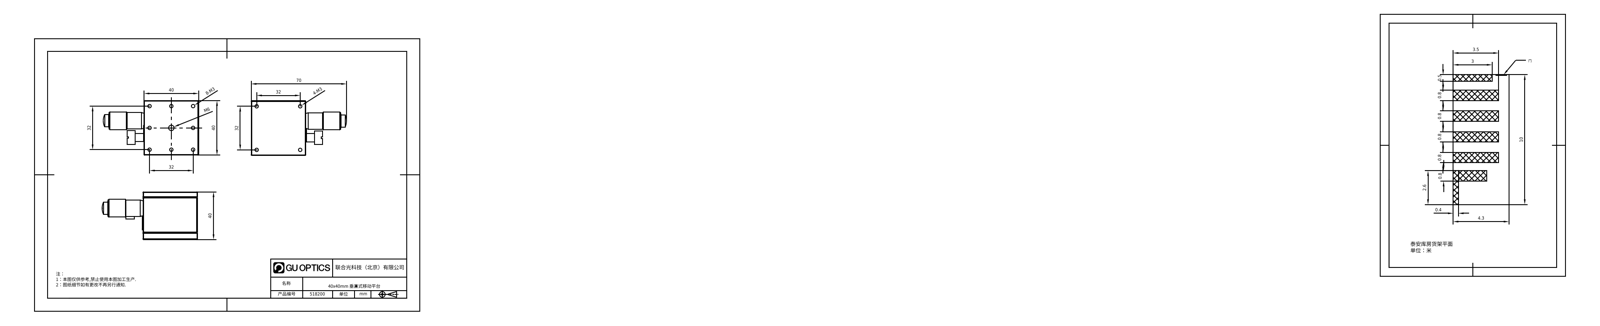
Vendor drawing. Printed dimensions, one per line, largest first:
70
40
40
40
32
32
32
32
10
M6
4.3
3.5
3
8-M3
4-M3
2.6
0.8
0.8
0.8
0.8
0.8
0.5
0.4
